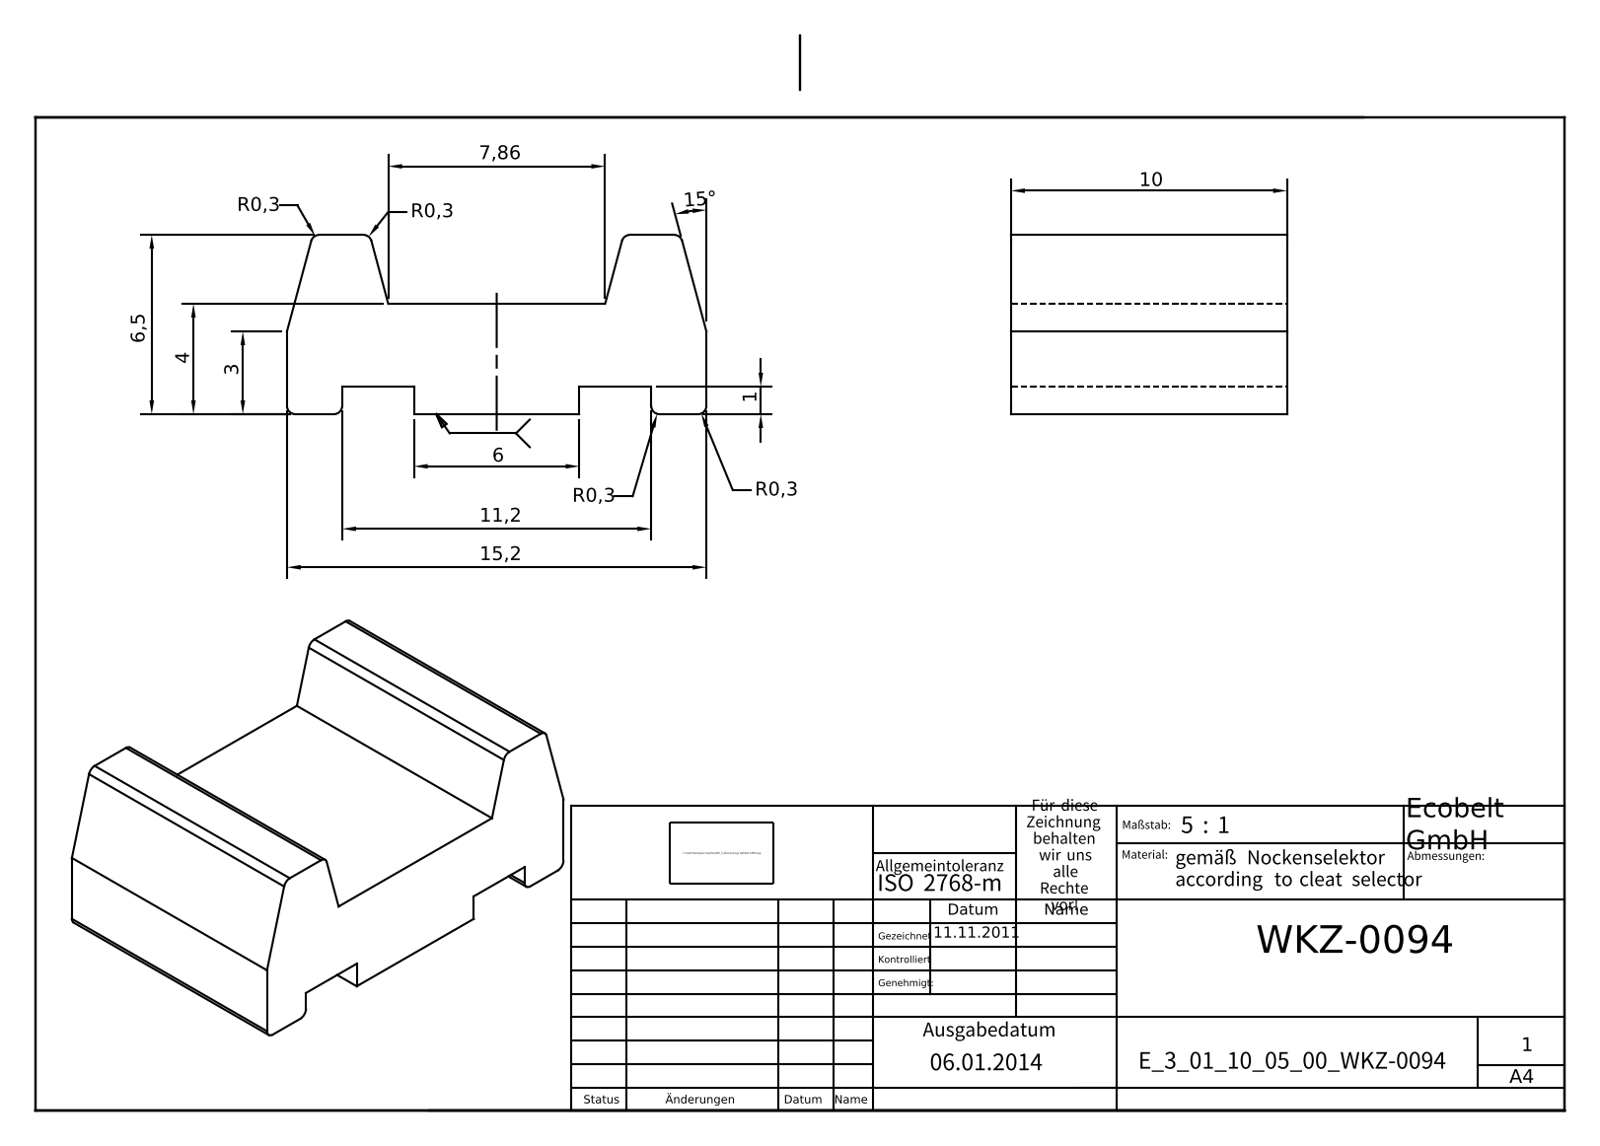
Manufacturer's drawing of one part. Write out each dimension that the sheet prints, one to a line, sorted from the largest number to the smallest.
15,2
15°
11,2
10
7,86
6,5
6
4
3
1
R0,3
R0,3
R0,3
R0,3
